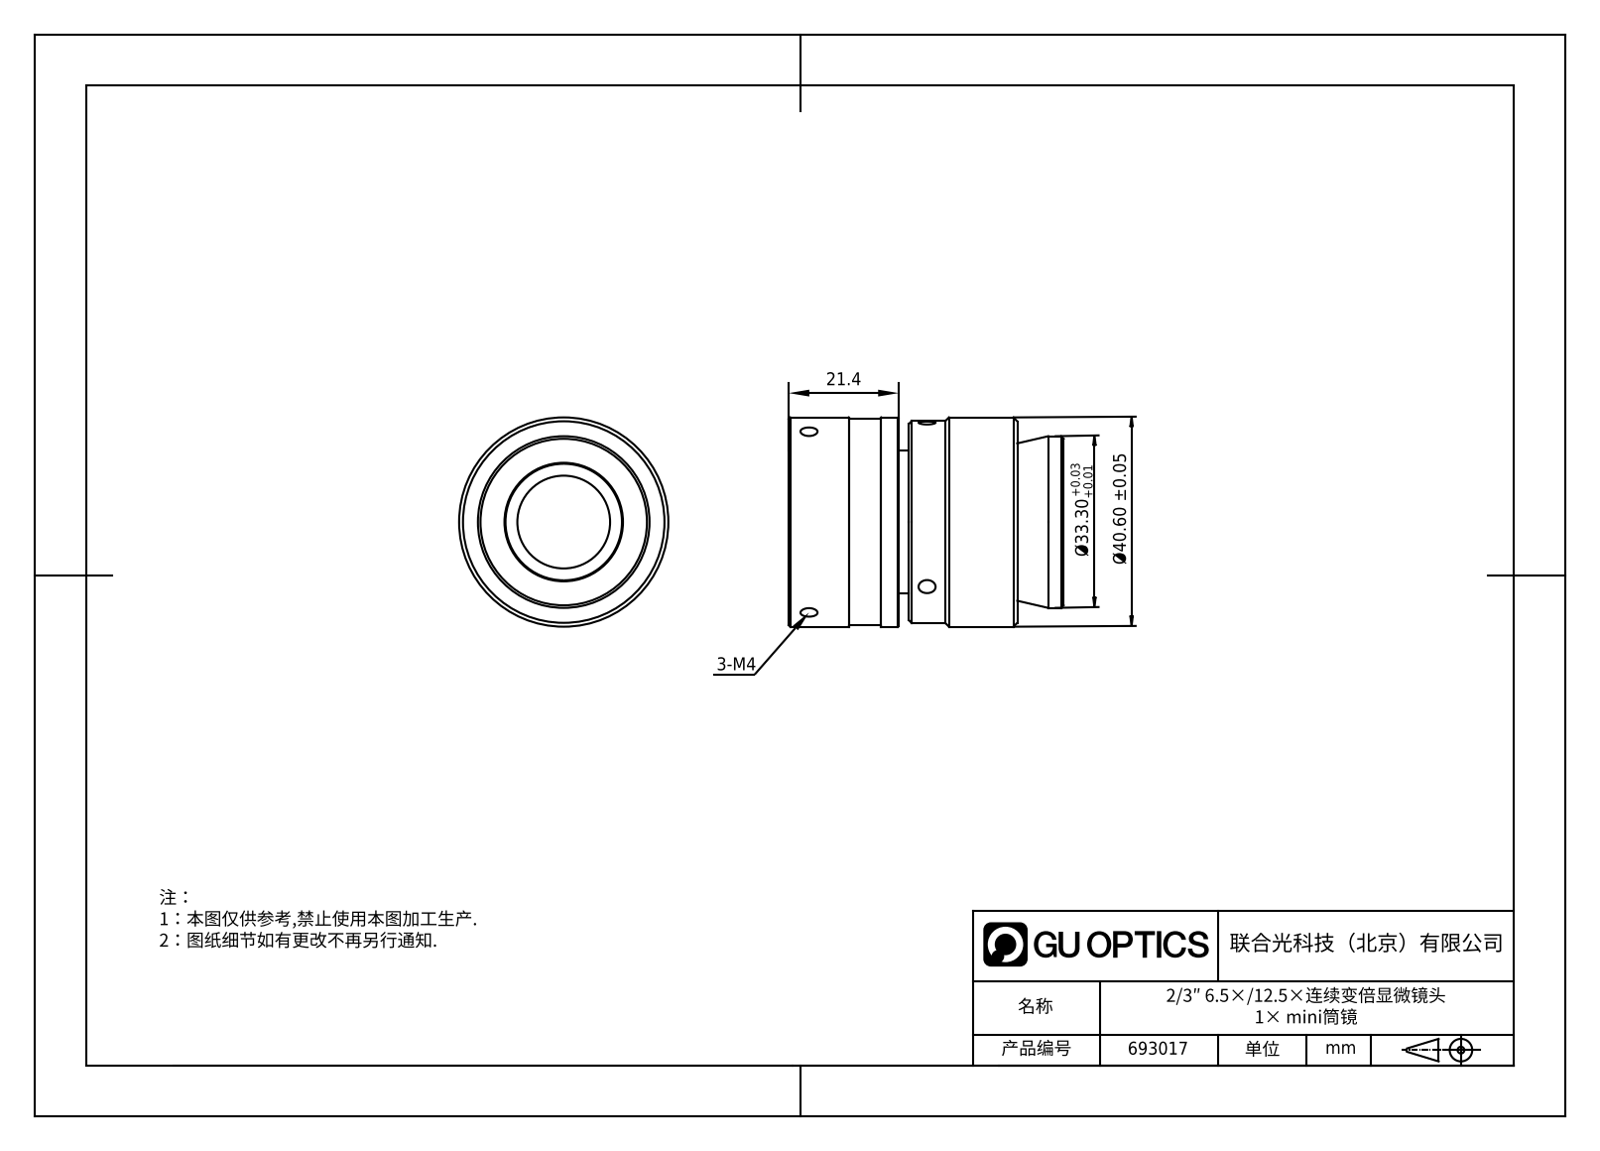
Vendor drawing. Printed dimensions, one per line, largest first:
21.4
